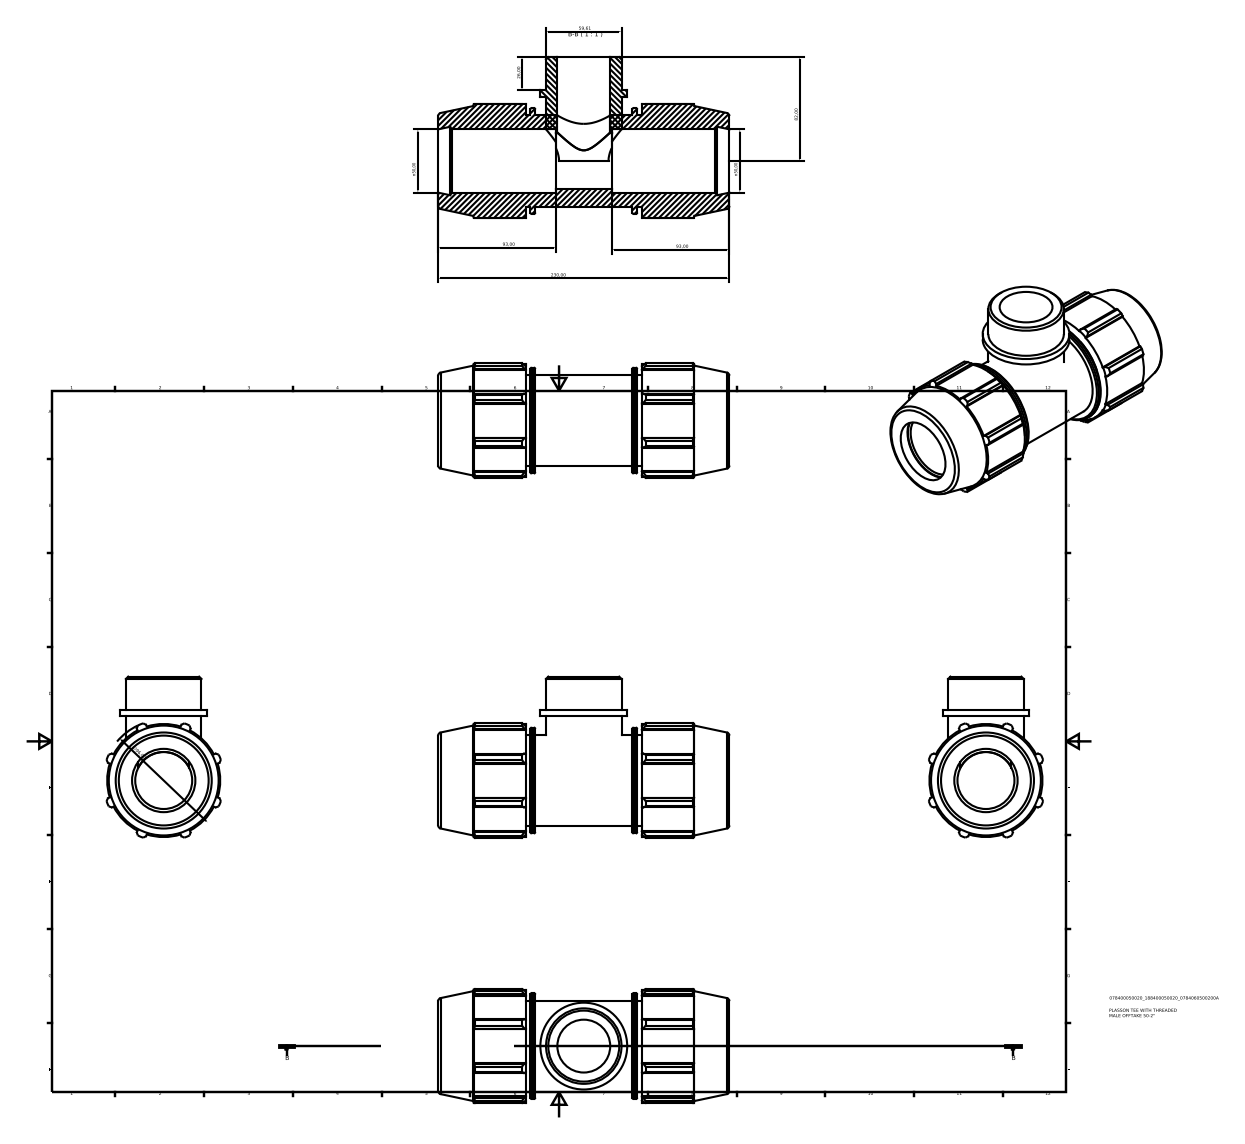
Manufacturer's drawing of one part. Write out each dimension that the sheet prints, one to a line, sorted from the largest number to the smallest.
230,00
∅96,00
93,00
93,00
82,00
59,61
n50,00
n50,00
26,00
